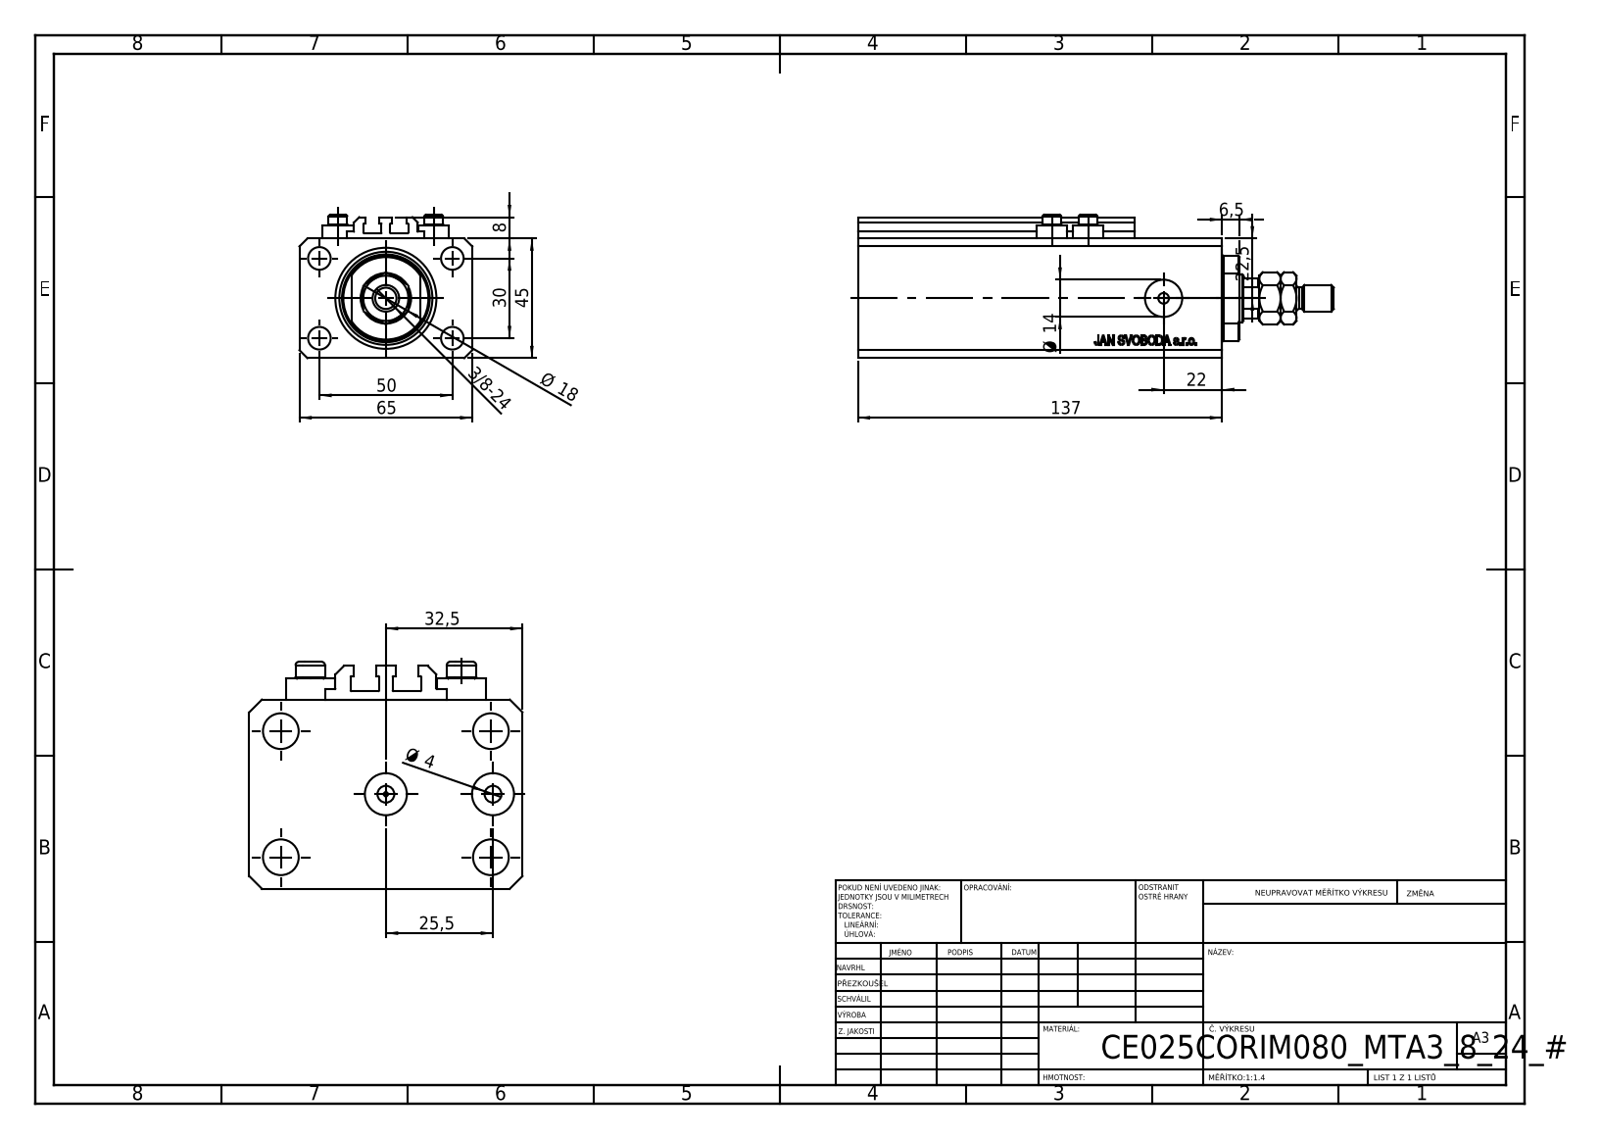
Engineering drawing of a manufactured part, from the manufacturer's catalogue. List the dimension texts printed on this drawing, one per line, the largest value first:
137
65
50
45
32,5
30
25,5
22,5
22
Ø 18
Ø 14
8
6,5
Ø 4
3/8-24
